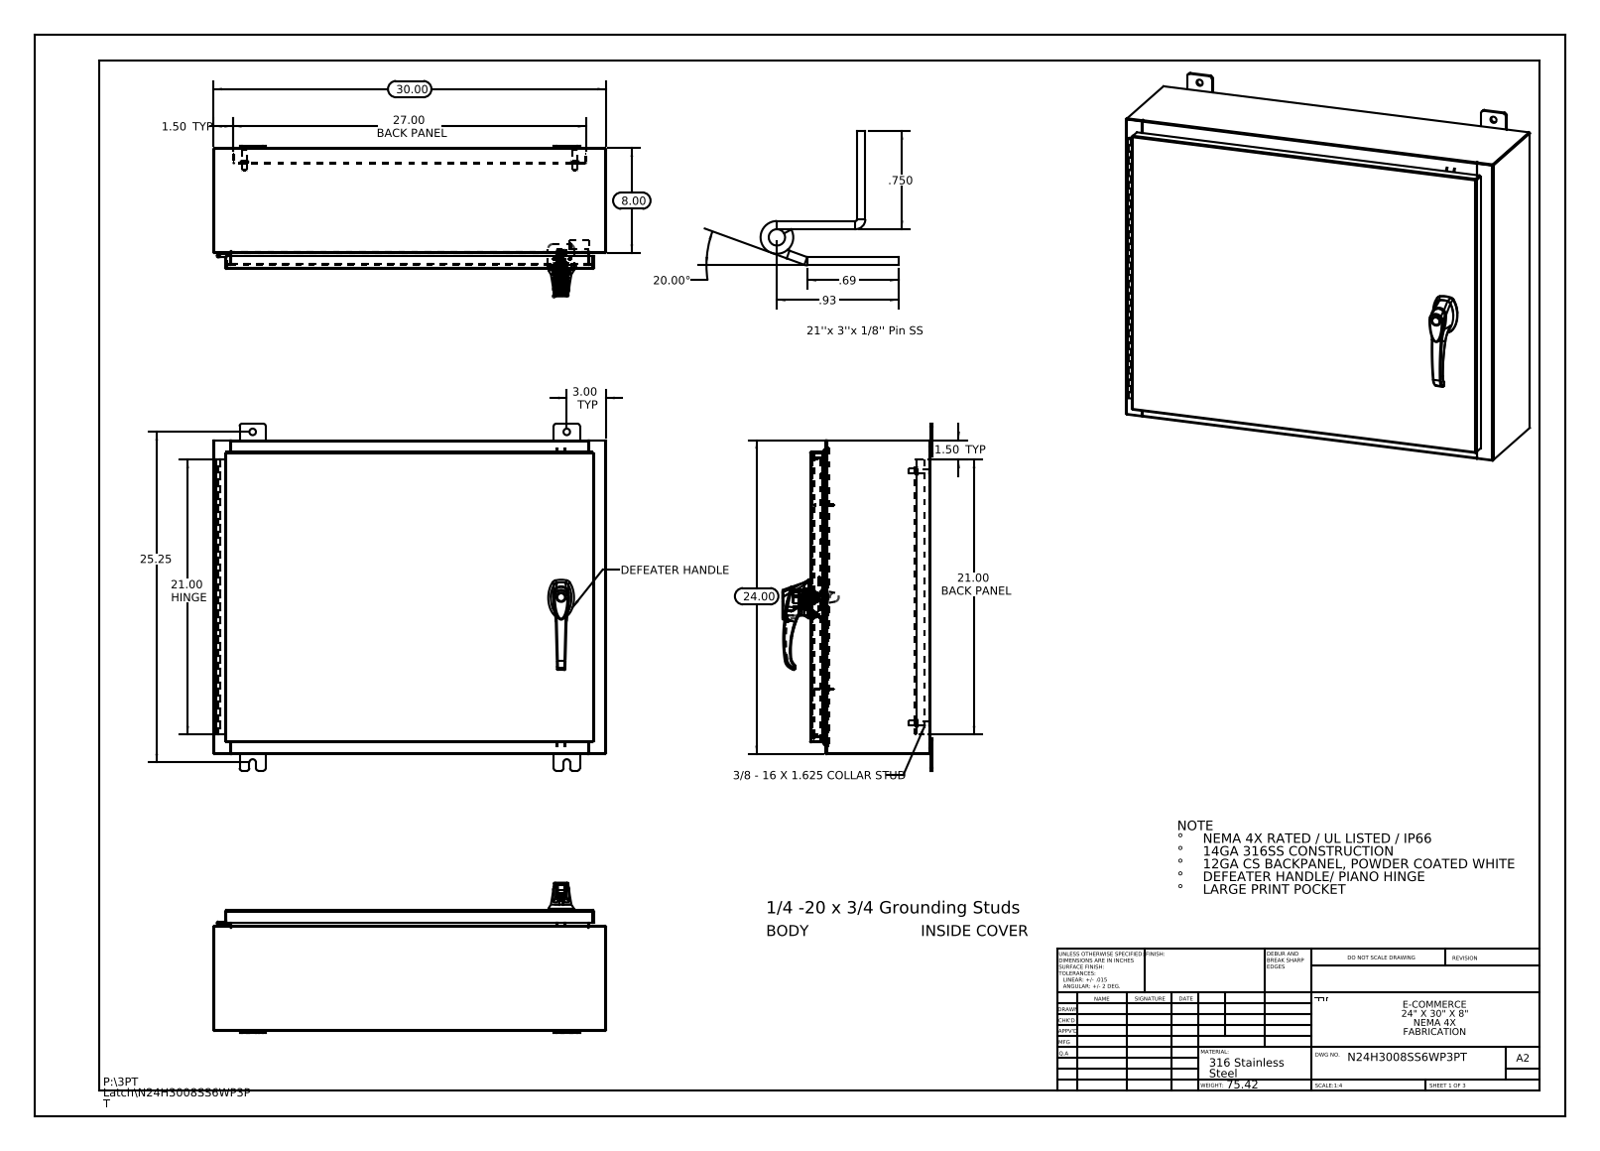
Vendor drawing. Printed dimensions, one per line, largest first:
30.00
27.00 BACK PANEL
25.25
24.00
21.00 HINGE
21.00 BACK PANEL
20.00°
8.00
3.00 TYP
1.50 TYP
1.50 TYP
.93
.750
.69
